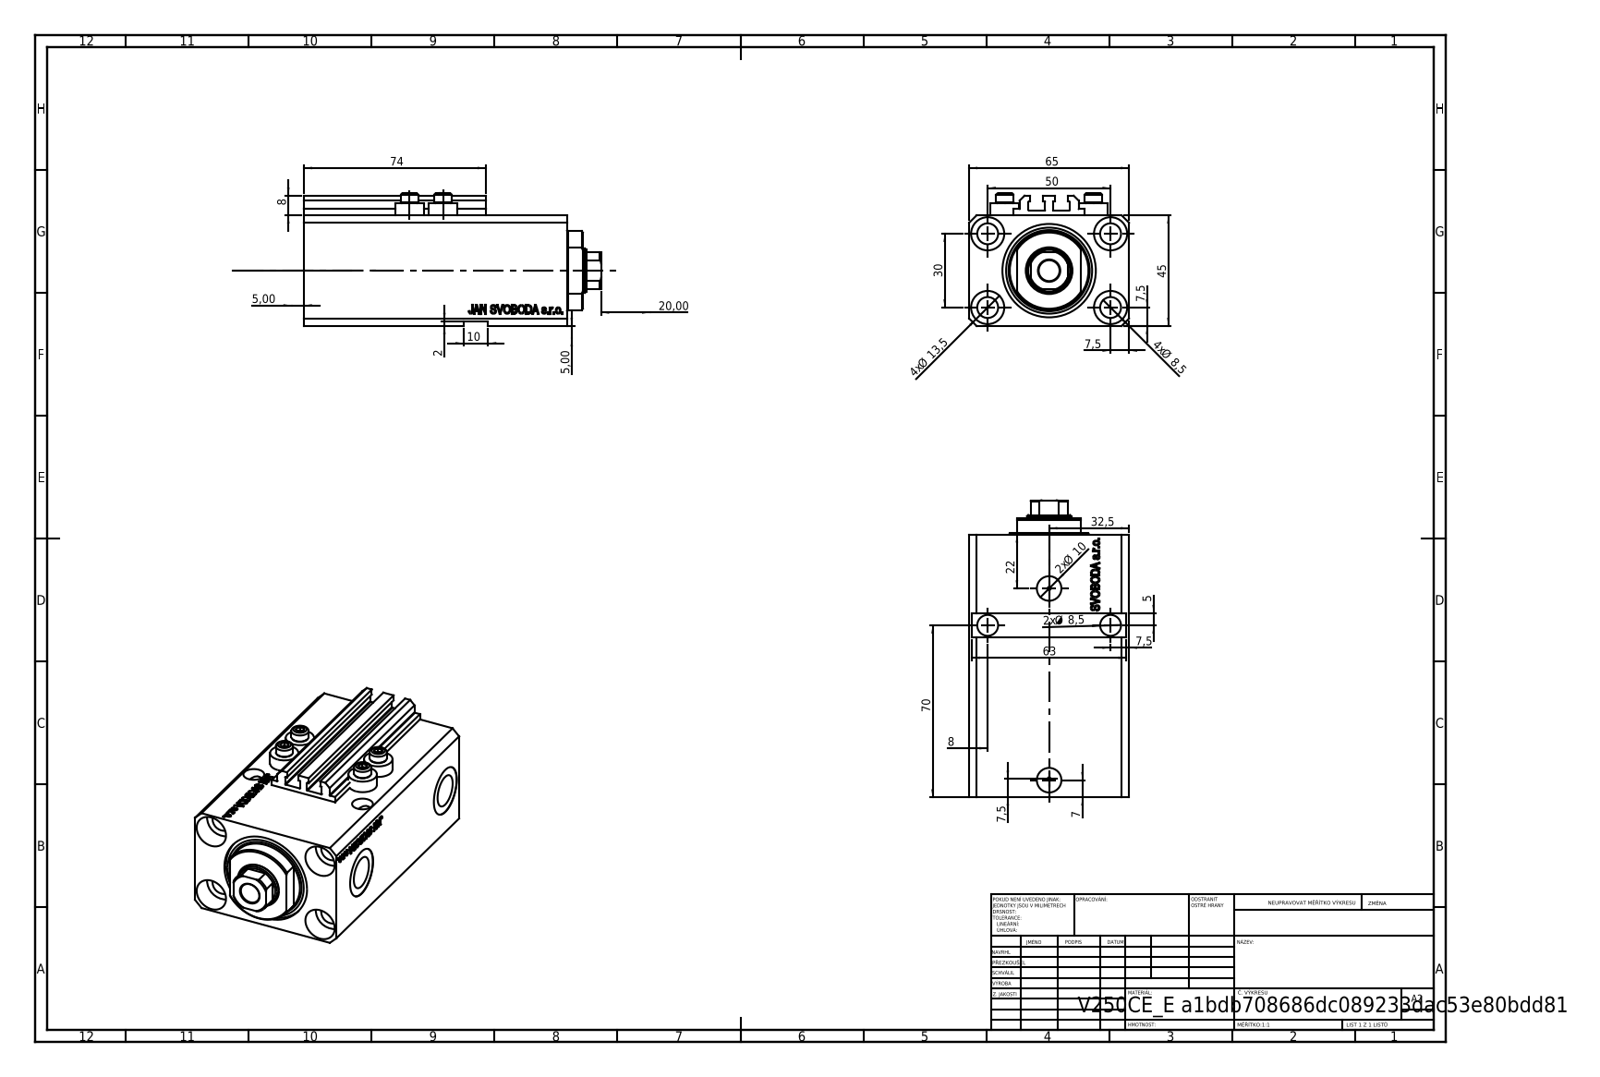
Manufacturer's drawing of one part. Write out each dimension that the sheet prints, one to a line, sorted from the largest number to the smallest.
74
70
65
63
50
45
32,5
30
22
20,00
4x Ø 13,5
10
2x Ø 10
4x Ø 8,5
2x Ø 8,5
8
8
7,5
7,5
7,5
7,5
7
5,00
5,00
5
2
